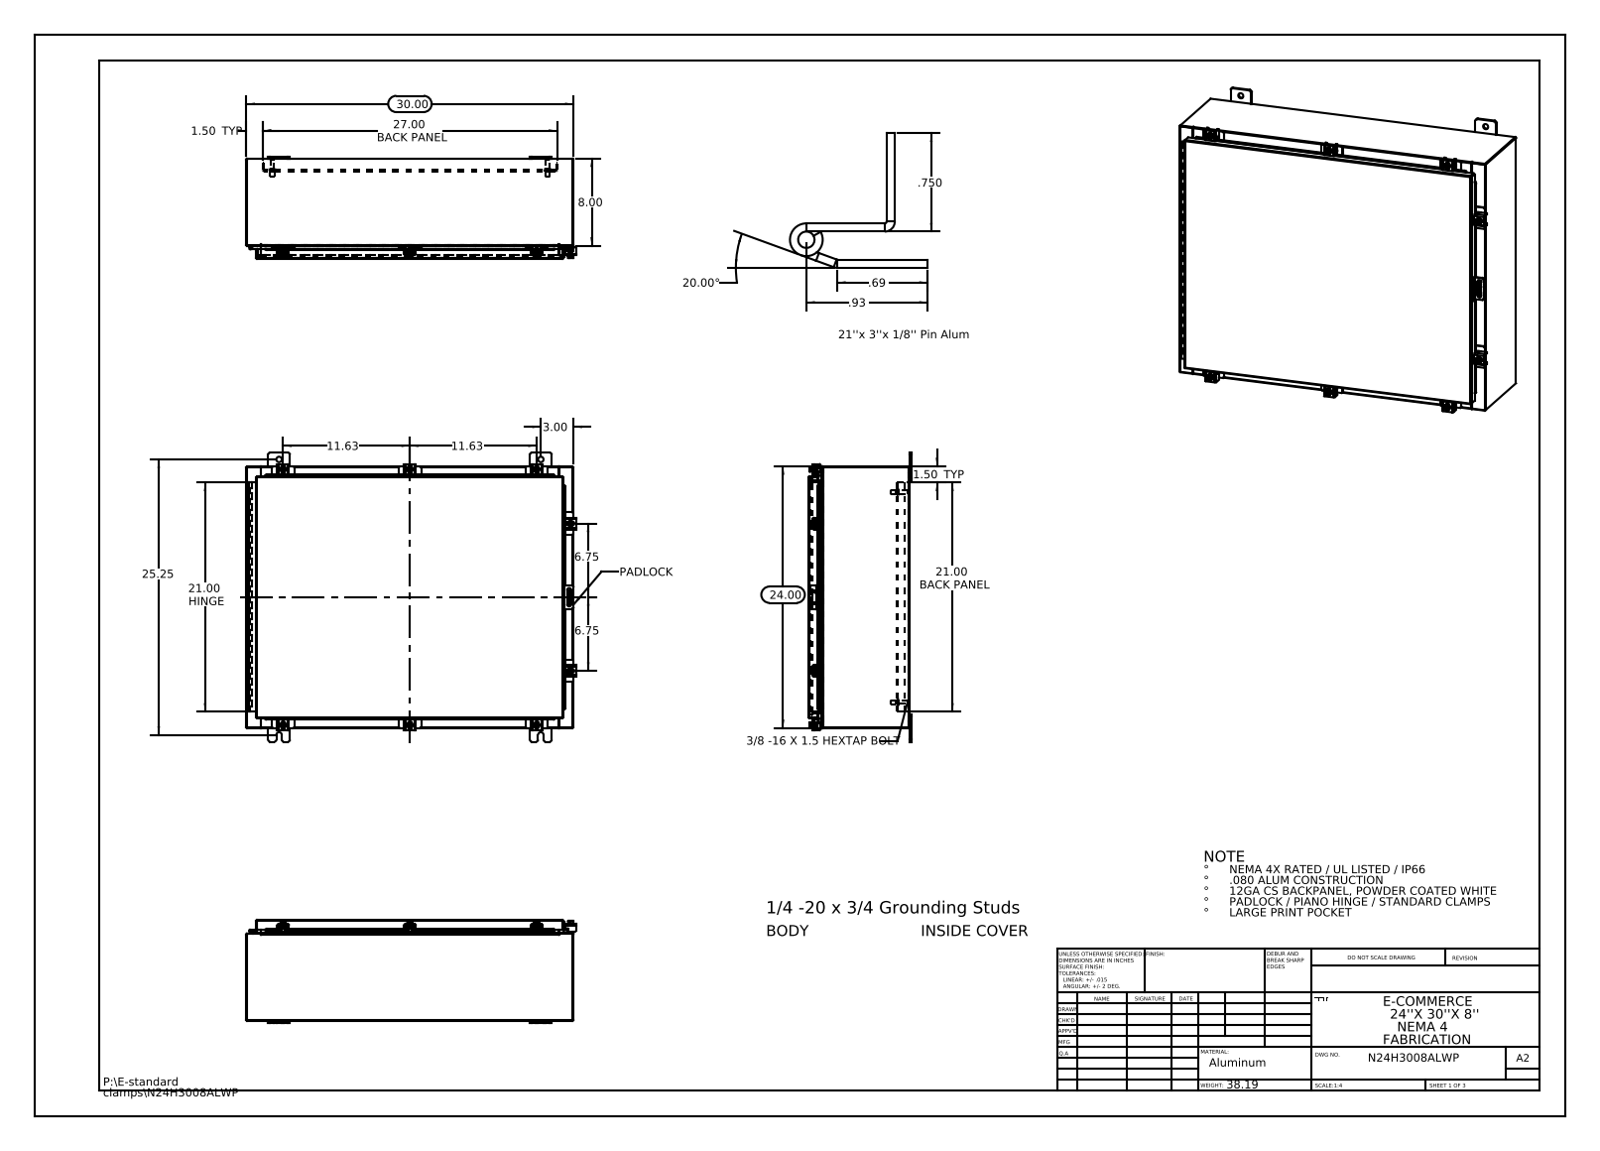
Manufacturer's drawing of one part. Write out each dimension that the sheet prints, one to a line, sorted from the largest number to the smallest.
30.00
27.00 BACK PANEL
25.25
24.00
21.00 HINGE
21.00 BACK PANEL
20.00°
11.63
11.63
8.00
6.75
6.75
3.00
1.50 TYP
1.50 TYP
.93
.750
.69
